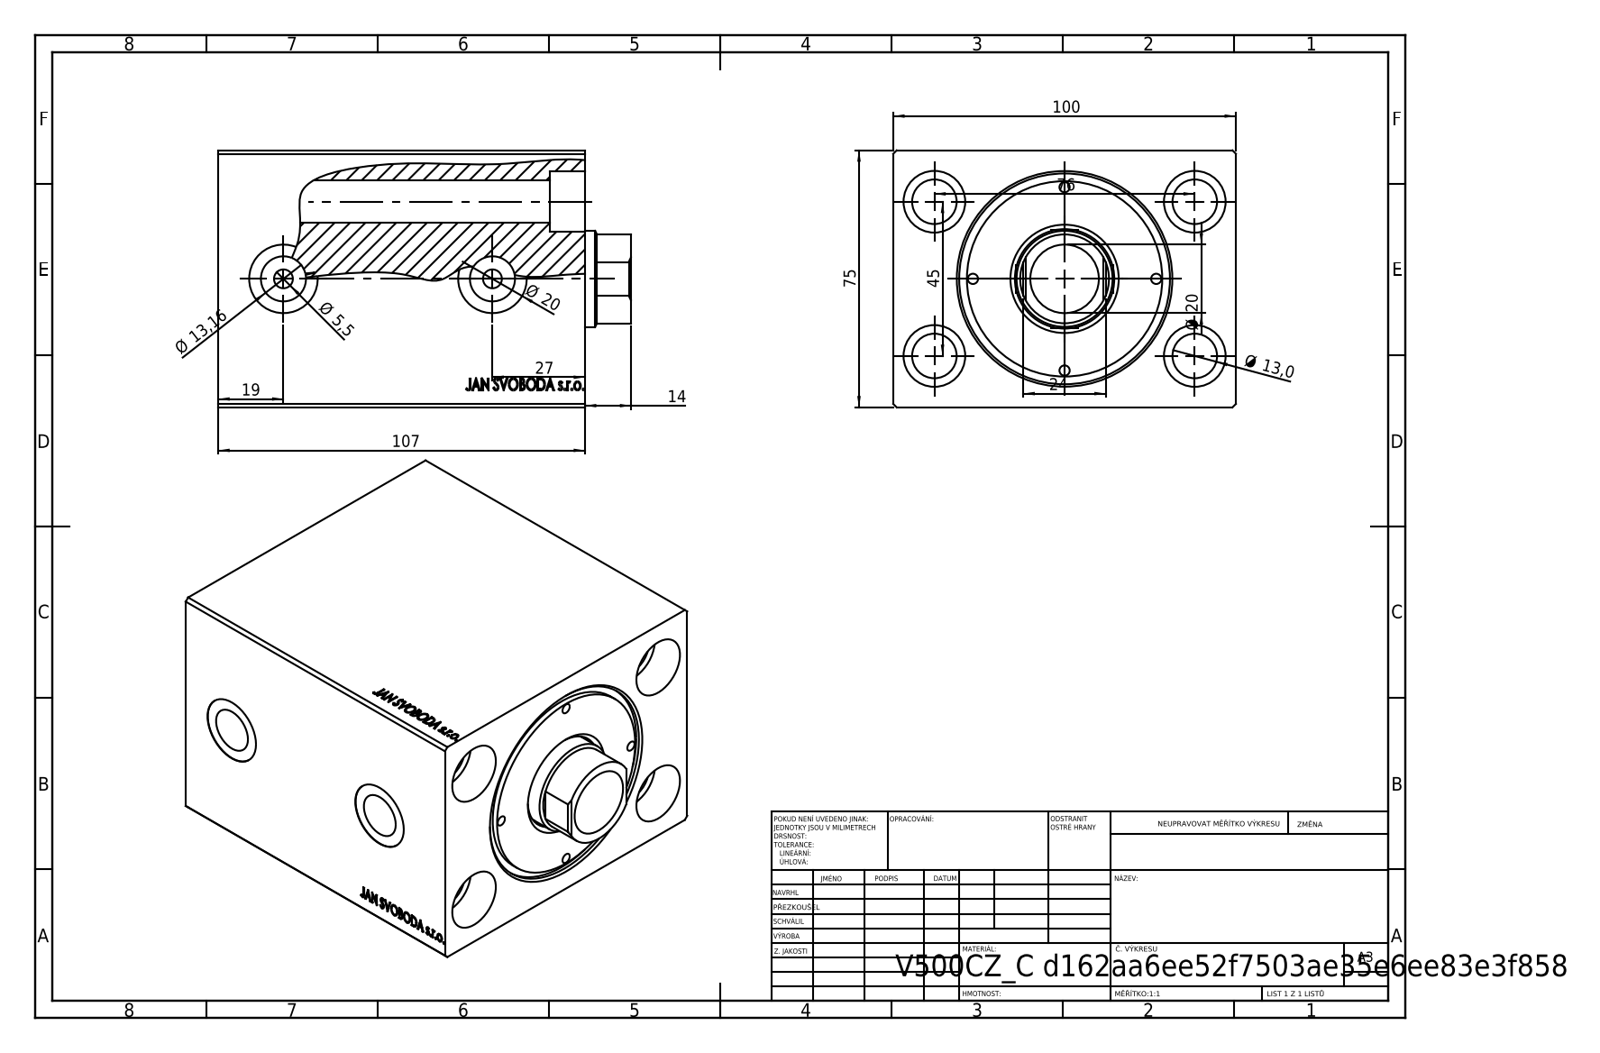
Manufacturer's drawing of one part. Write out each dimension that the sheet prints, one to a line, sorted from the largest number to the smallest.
107
100
76
75
45
27
24
Ø 20
Ø 20
19
14
Ø 13,16
Ø 13,0
Ø 5,5
